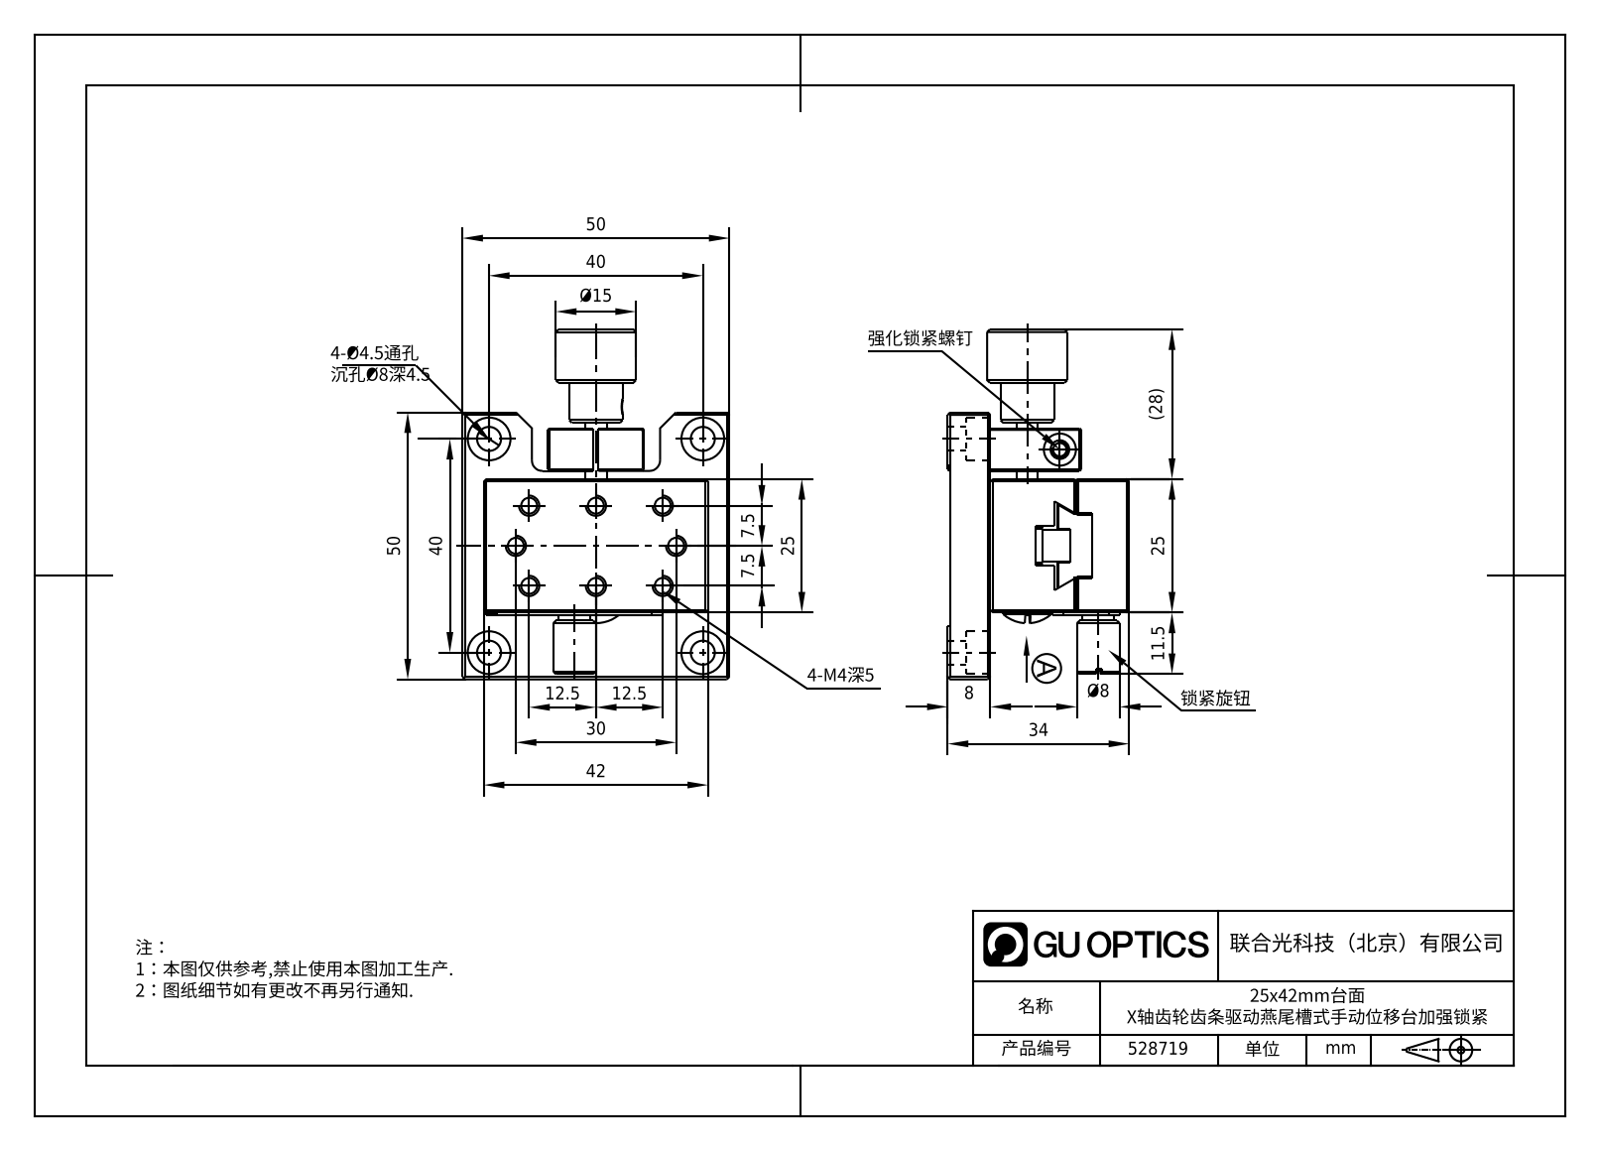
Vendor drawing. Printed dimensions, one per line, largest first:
50
50
42
40
40
34
30
(28)
25
25
Ø15
12.5
12.5
11.5
8
Ø8
7.5
7.5
